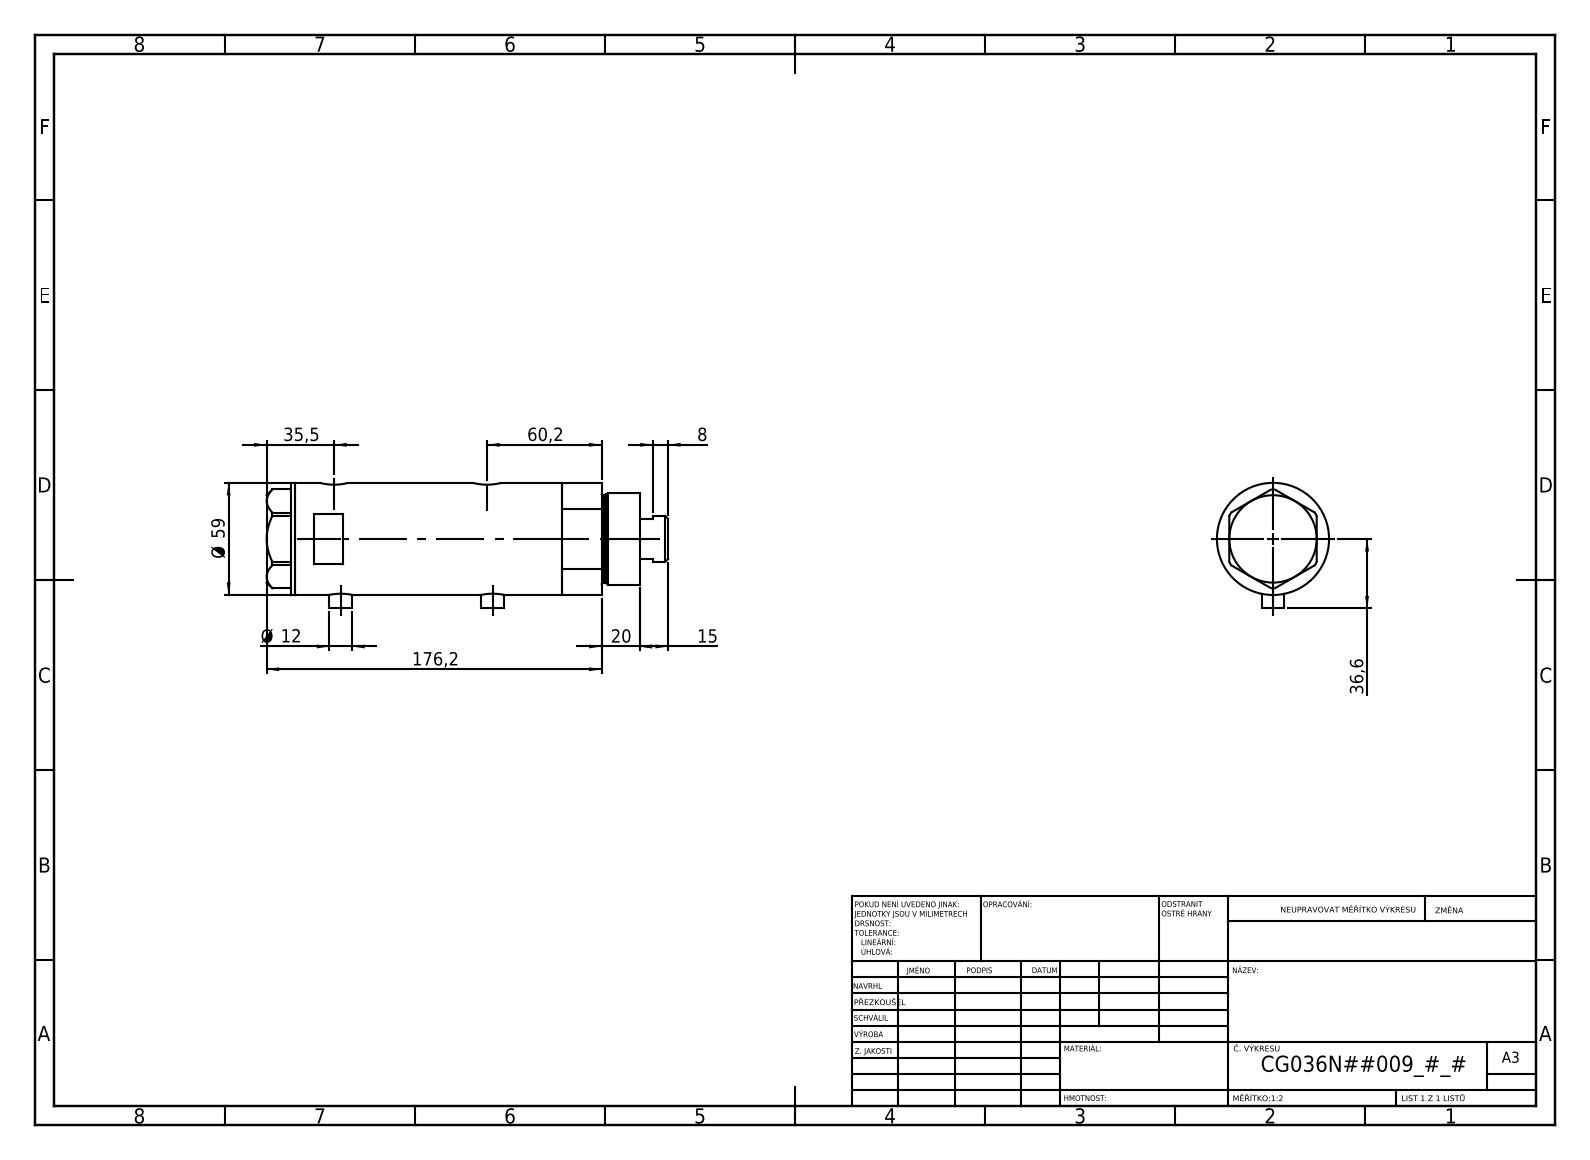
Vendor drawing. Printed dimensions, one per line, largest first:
176,2
60,2
Ø 59
36,6
35,5
20
15
Ø 12
8
